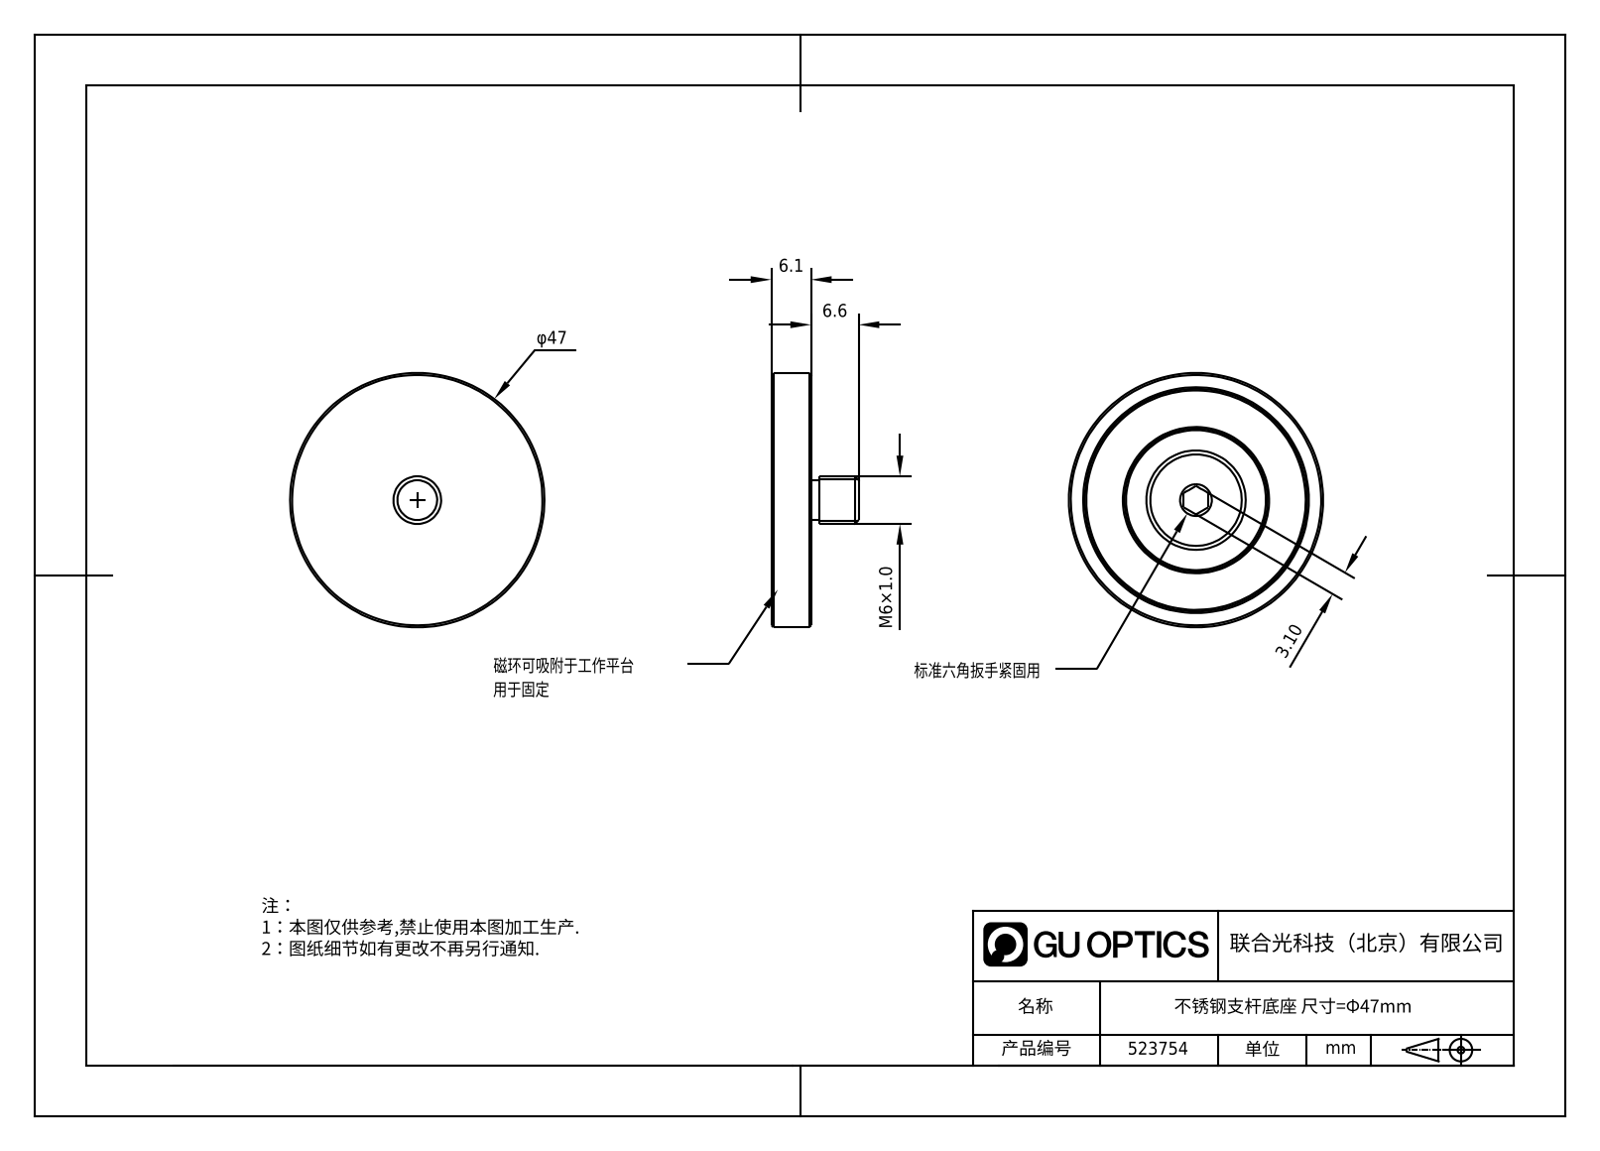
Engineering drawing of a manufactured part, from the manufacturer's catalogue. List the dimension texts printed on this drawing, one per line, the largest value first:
6.6
6.1
M6×1.0
3.10
